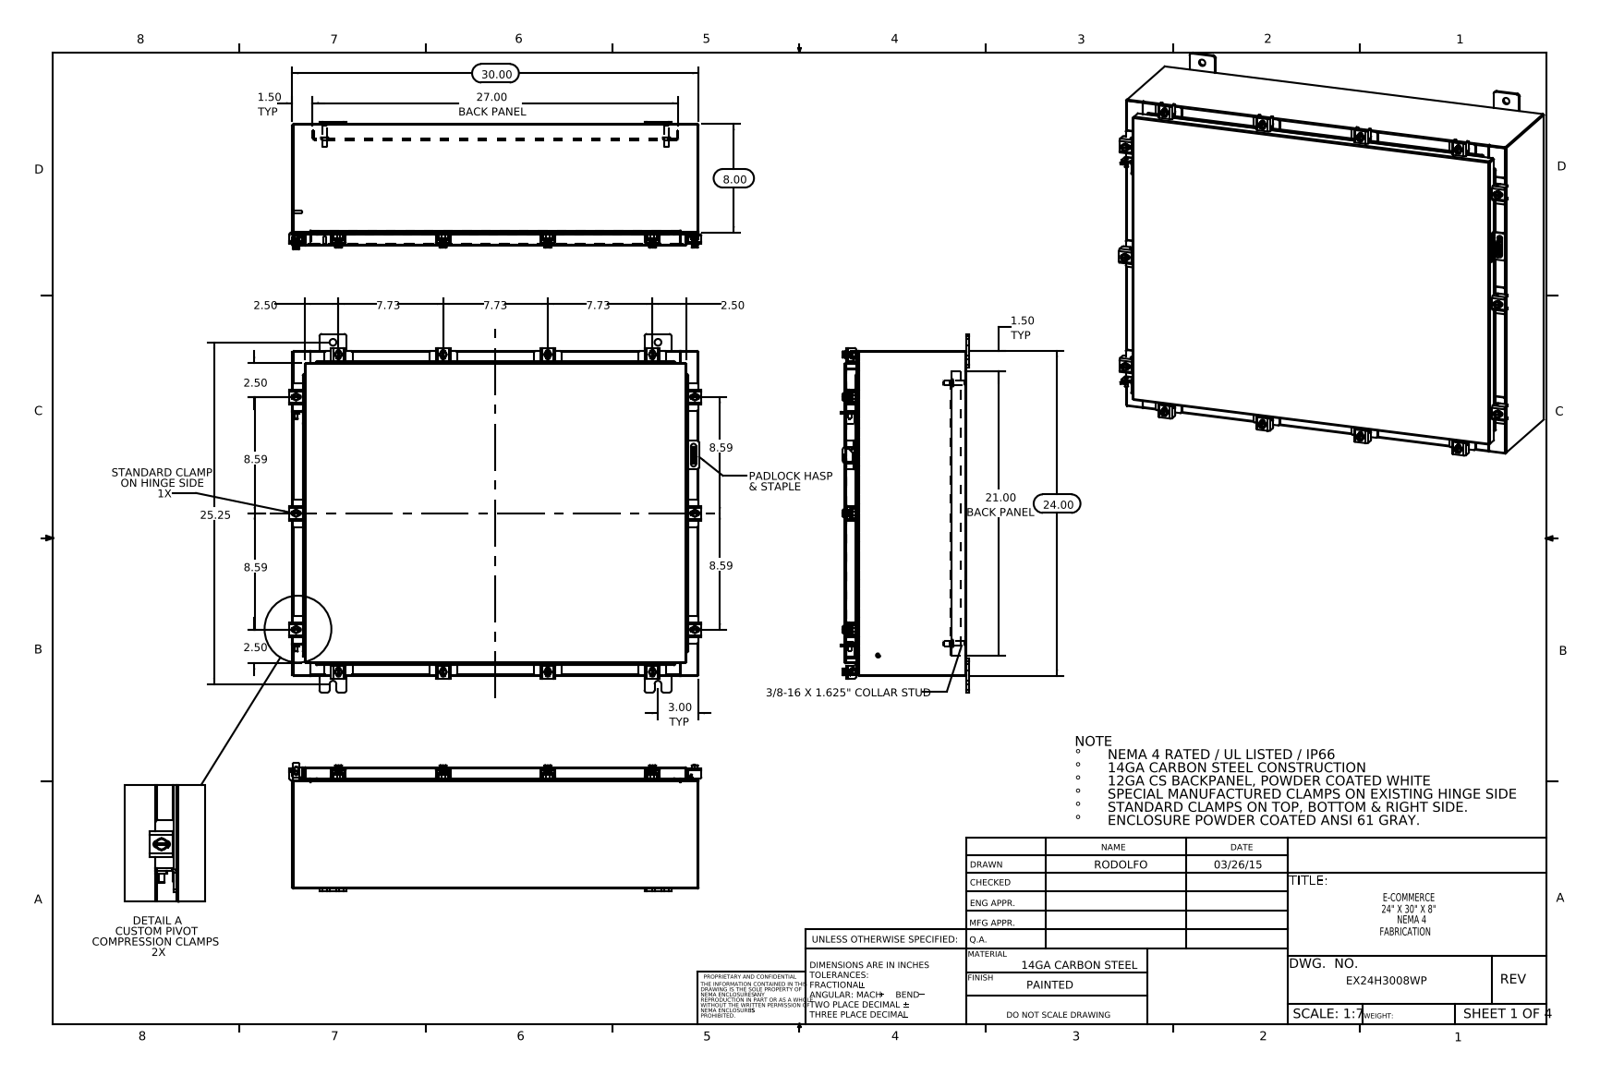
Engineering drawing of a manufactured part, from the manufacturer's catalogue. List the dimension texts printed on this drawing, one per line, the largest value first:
30.00
27.00 BACK PANEL
25.25
24.00
21.00 BACK PANEL
8.59
8.59
8.59
8.59
8.00
7.73
7.73
7.73
3.00 TYP
2.50
2.50
2.50
2.50
1.50 TYP
1.50 TYP
